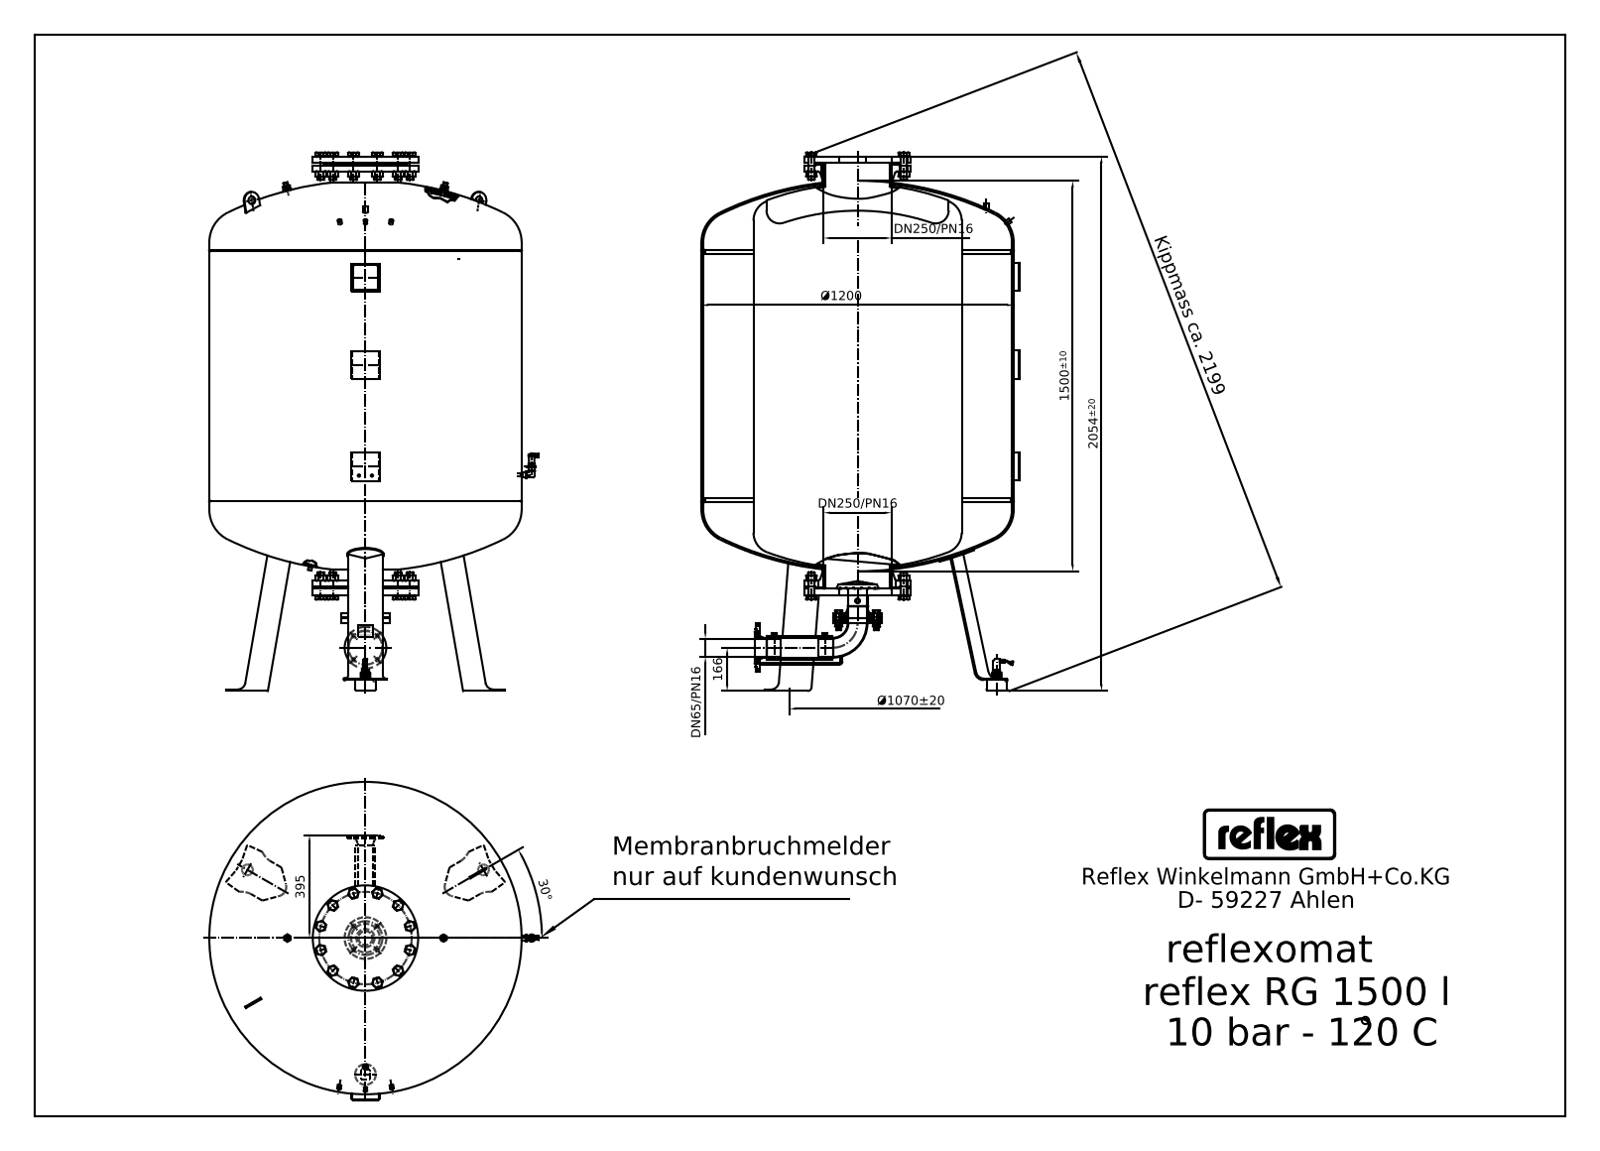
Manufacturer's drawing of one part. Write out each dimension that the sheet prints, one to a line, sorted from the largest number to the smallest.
Kippmass ca. 2199
2054±20
1500±10
Ø1200
Ø1070±20
395
DN250/PN16
DN250/PN16
166
DN65/PN16
30°
